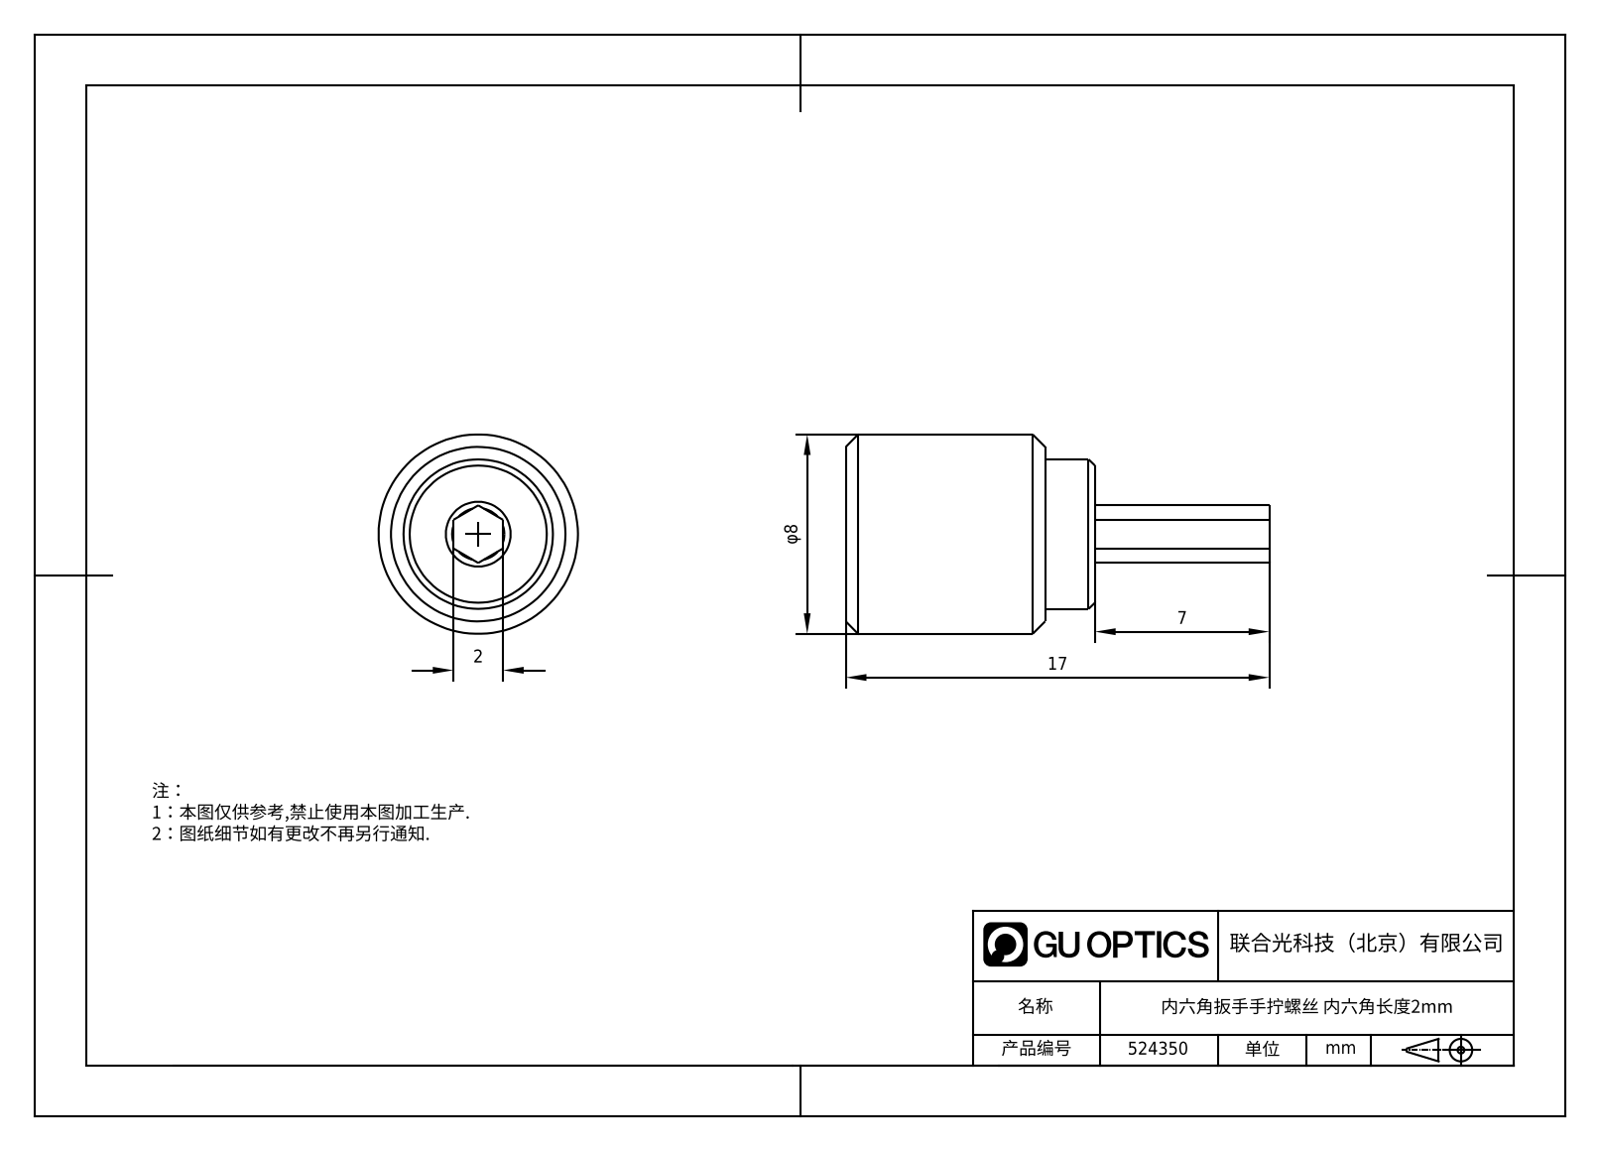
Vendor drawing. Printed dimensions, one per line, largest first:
17
φ8
7
2
